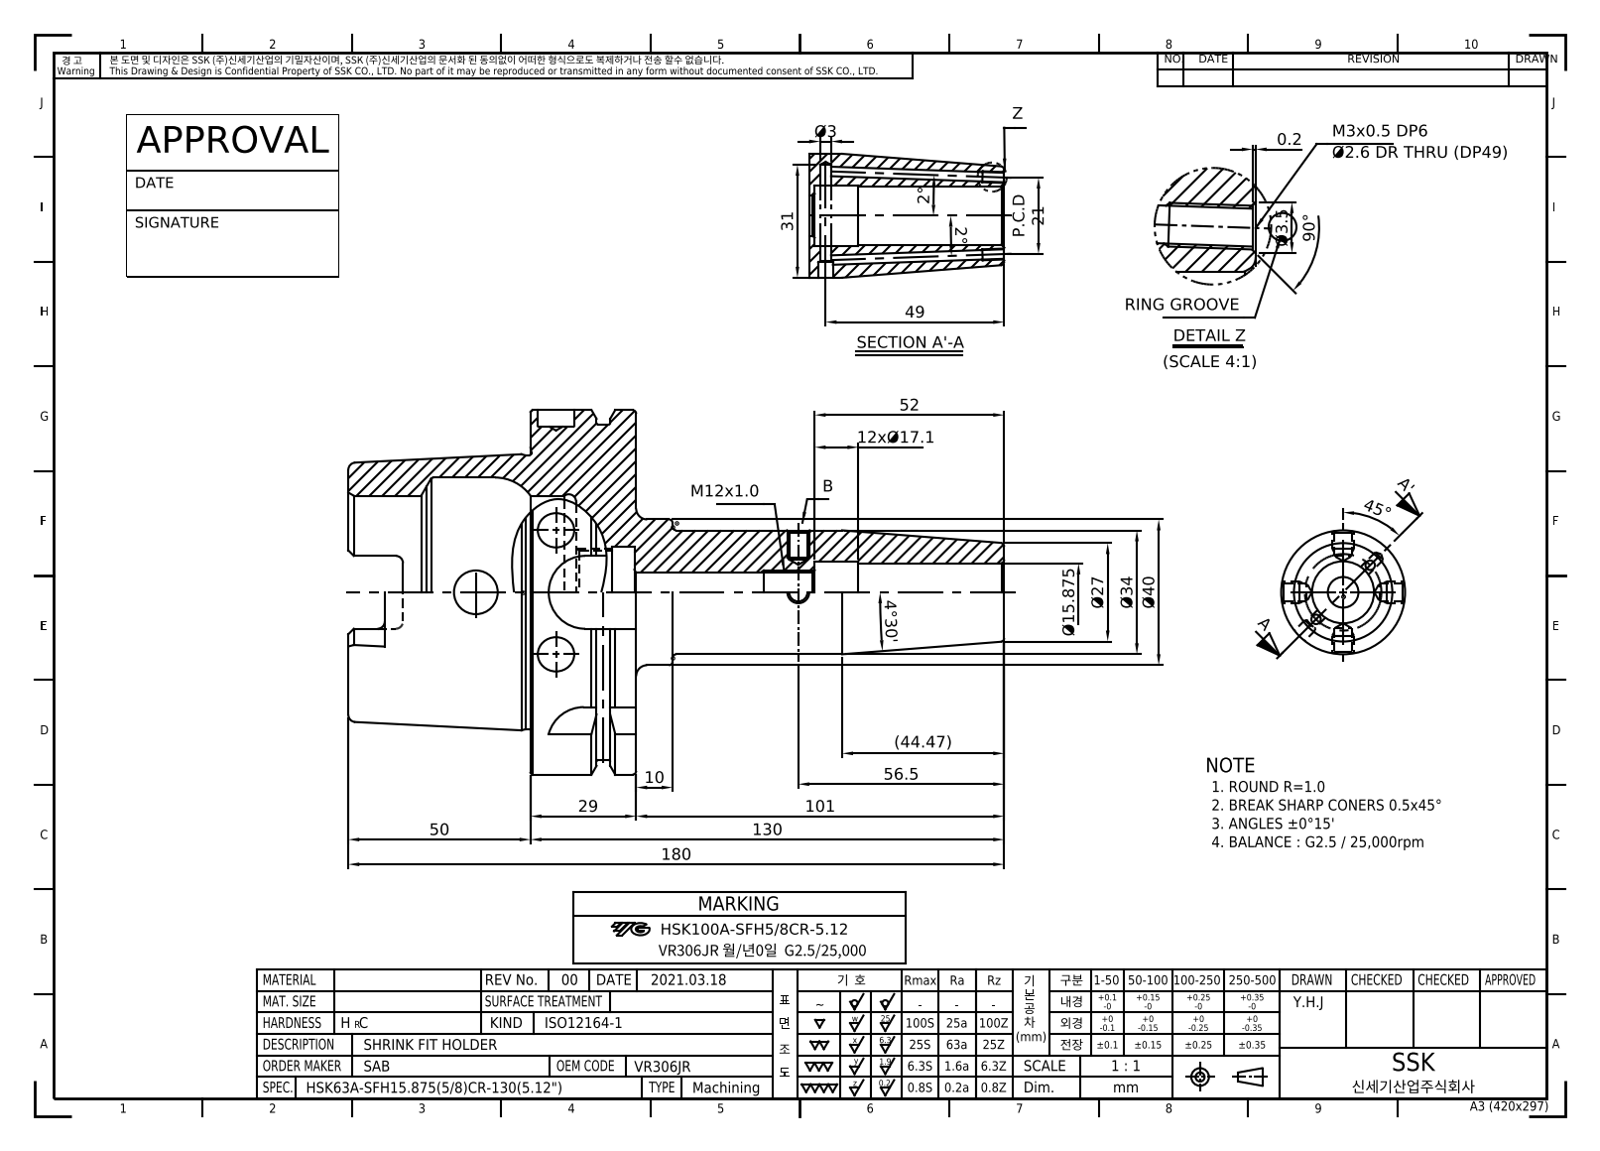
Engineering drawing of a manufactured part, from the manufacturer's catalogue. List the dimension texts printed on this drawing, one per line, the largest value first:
180
130
101
90°
56.5
52
50
49
45°
(44.47)
Ø40
Ø34
31
29
Ø27
P.C.D 21
12xØ17.1
Ø15.875
10
4°30'
Ø3.5
Ø3
2°
2°
0.2
